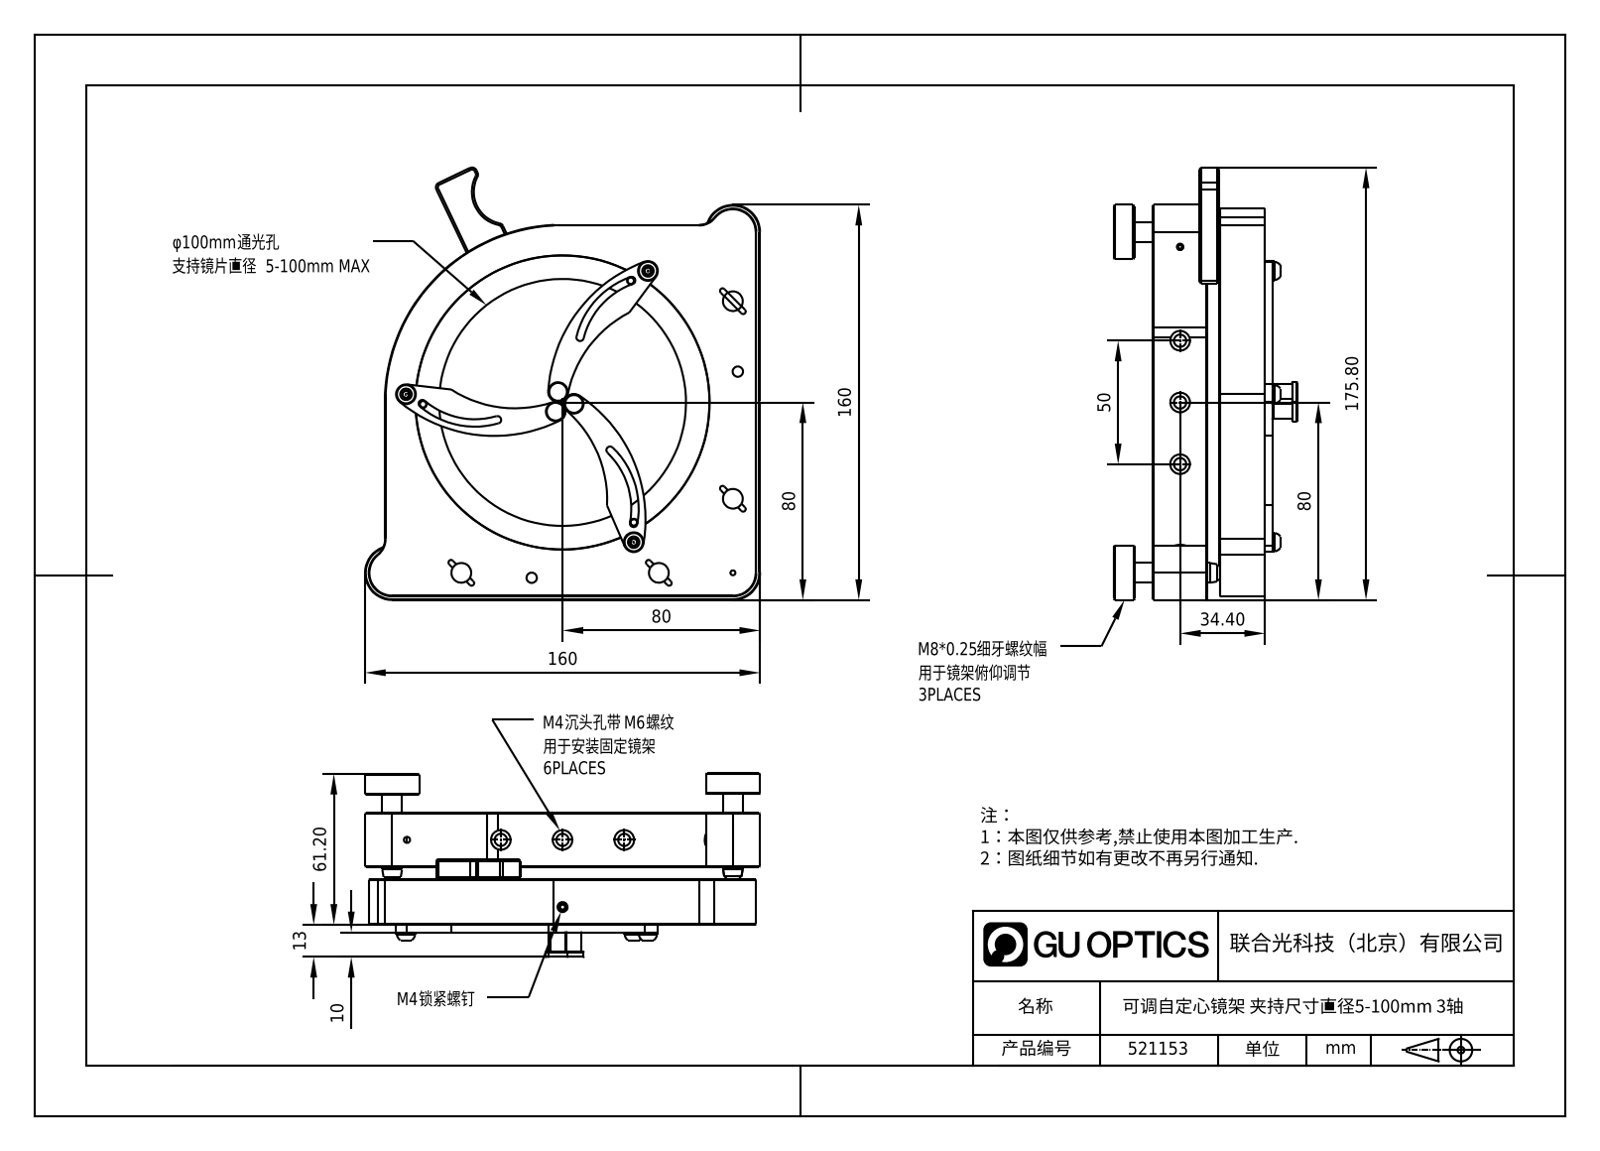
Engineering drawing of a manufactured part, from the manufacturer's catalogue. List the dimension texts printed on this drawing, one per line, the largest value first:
175.80
160
160
80
80
80
61.20
50
34.40
13
10
